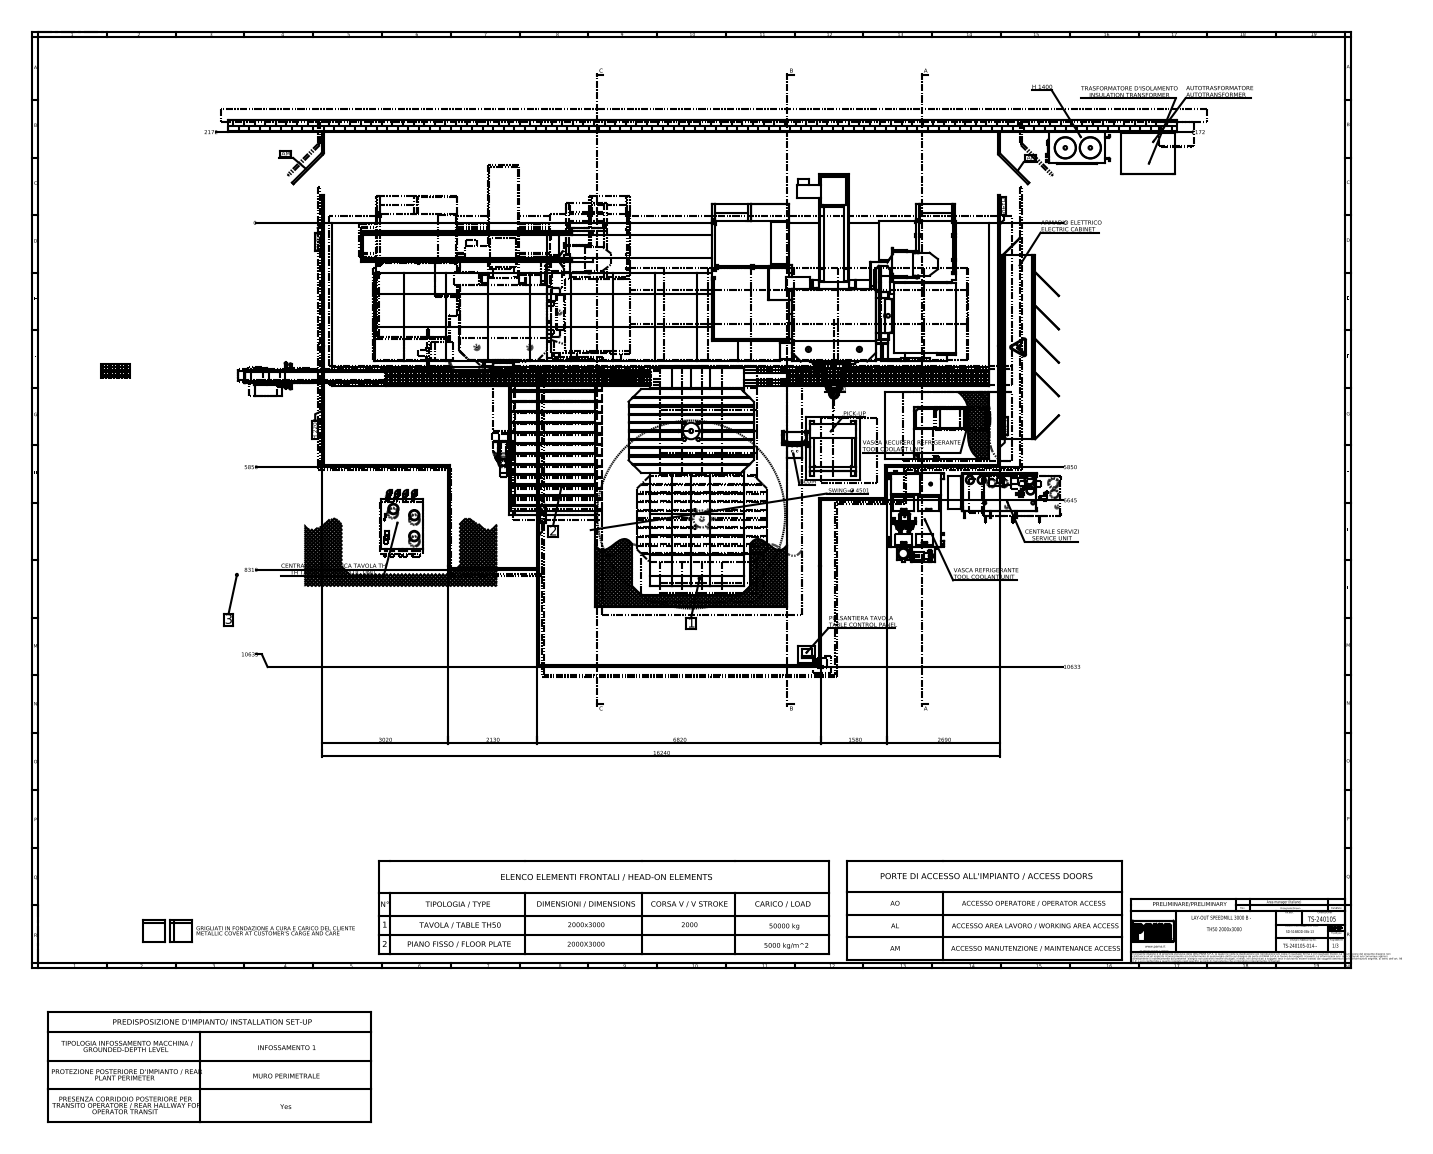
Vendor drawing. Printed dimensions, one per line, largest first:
16240
10633
10633
8310
6820
6645
5850
5850
SWING= Ø 4501
3020
2690
2172
2172
2130
1580
30
0
0
